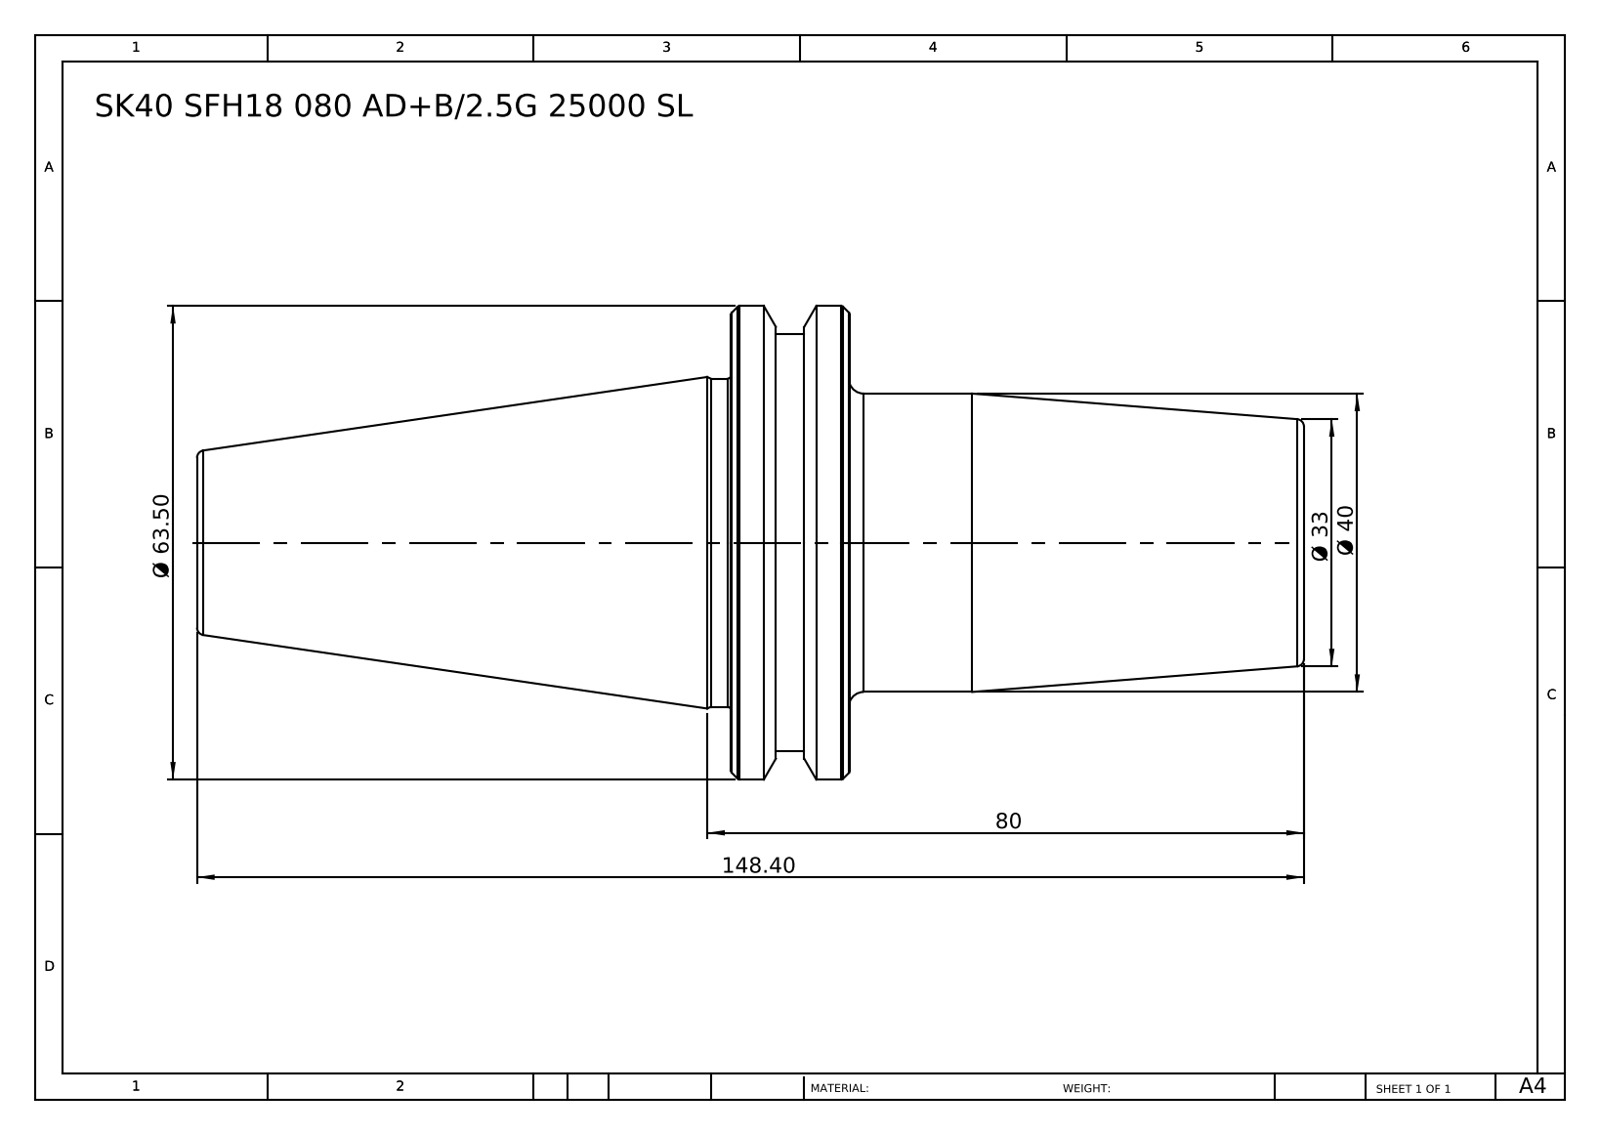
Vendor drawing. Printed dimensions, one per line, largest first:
148.40
80
Ø 63.50
Ø 40
Ø 33
